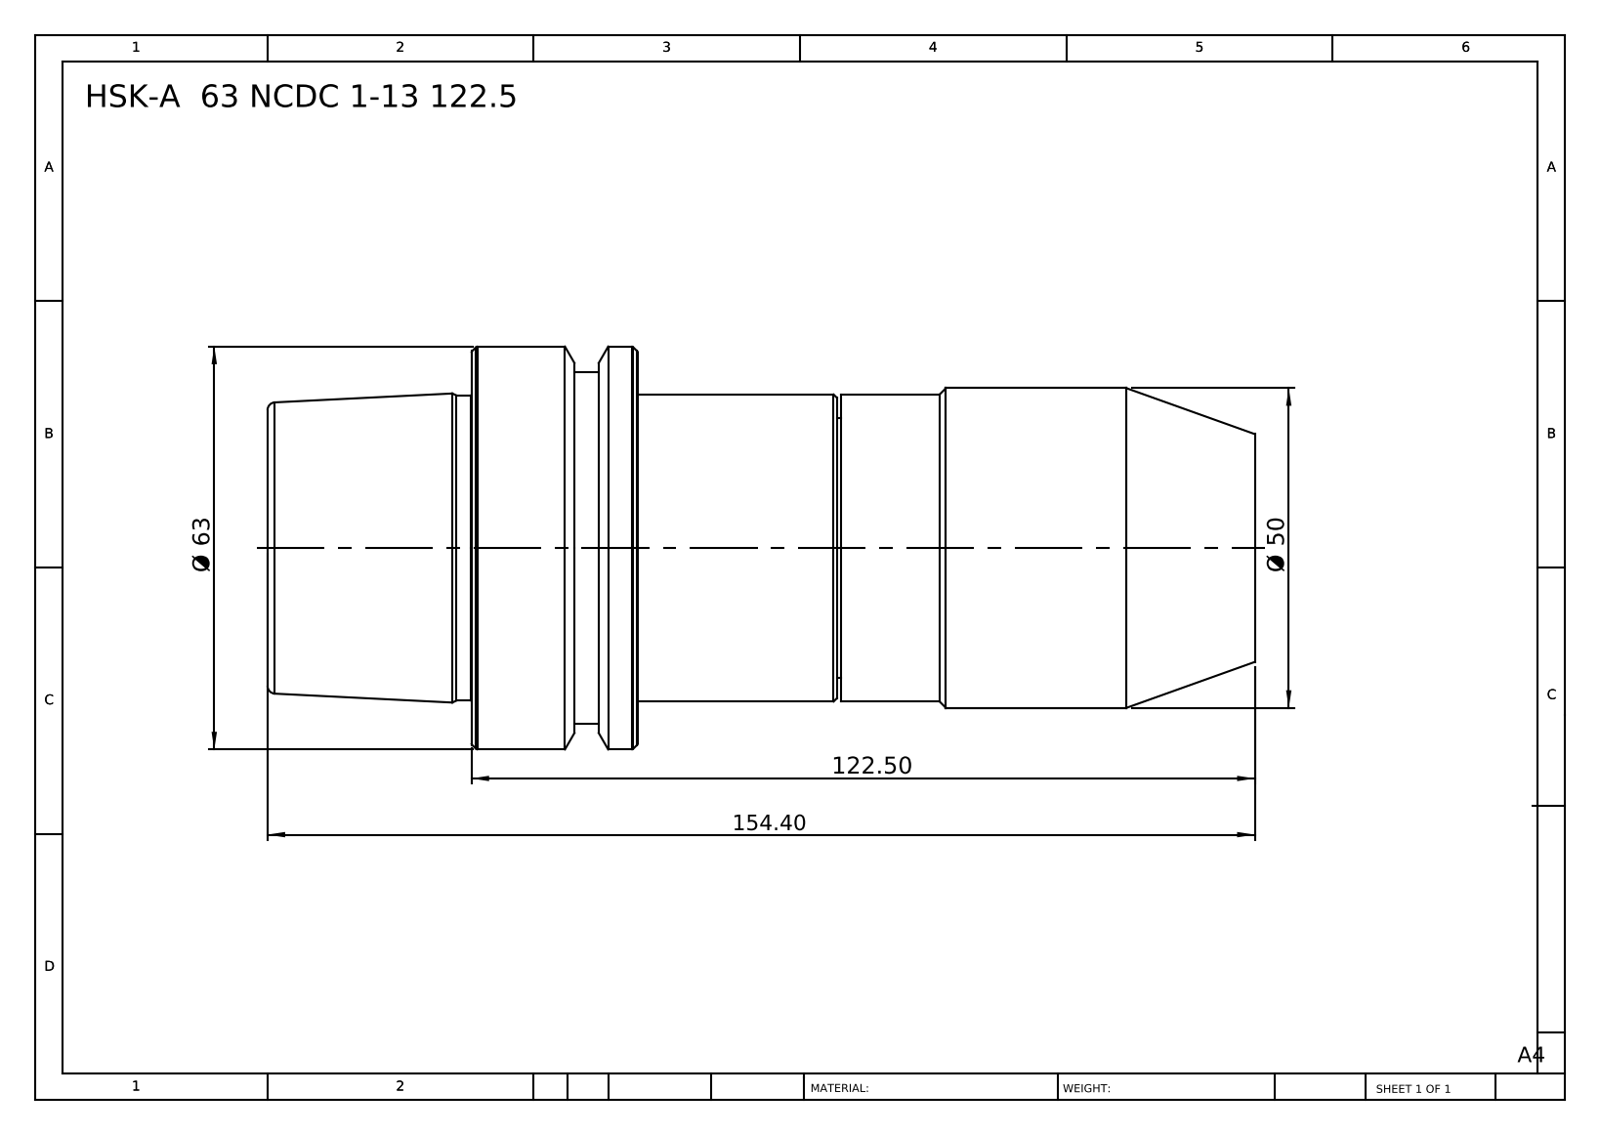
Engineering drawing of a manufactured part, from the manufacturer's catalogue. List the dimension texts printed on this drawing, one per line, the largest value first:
154.40
122.50
Ø 63
Ø 50
